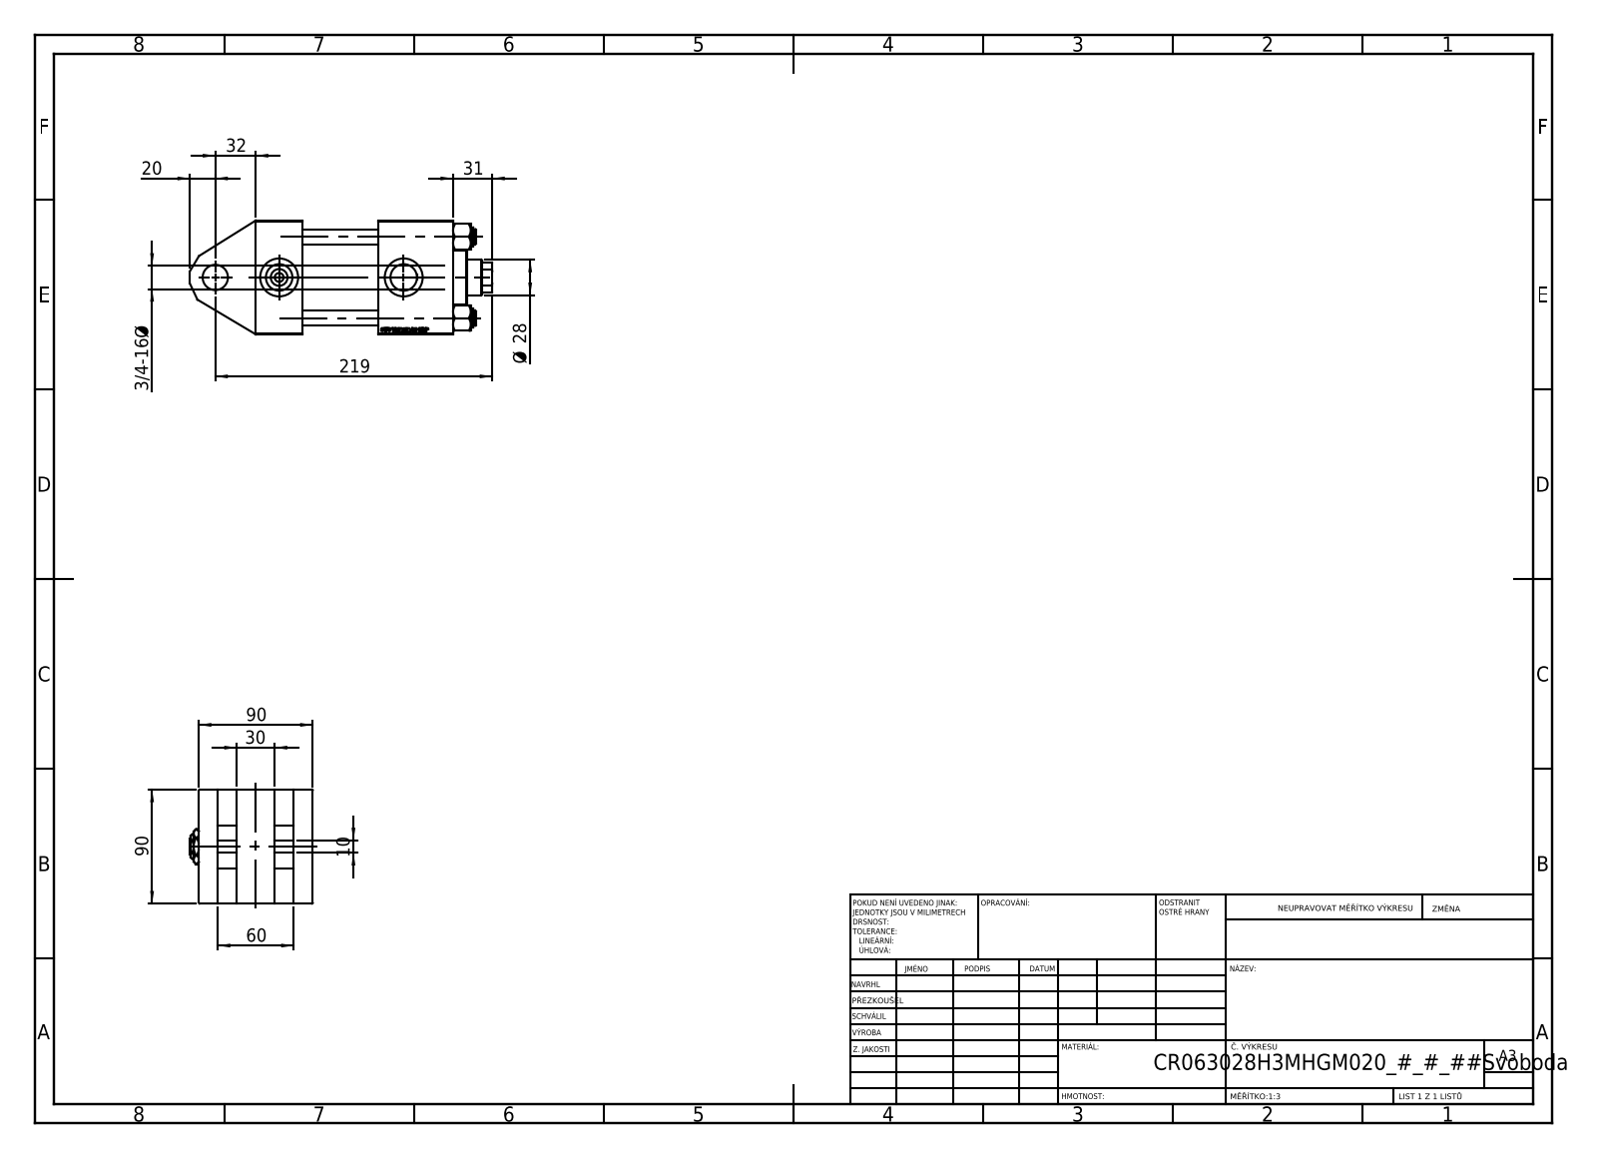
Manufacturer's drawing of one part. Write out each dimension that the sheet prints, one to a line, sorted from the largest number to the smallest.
219
90
90
60
32
31
30
Ø 28
20
10
3/4-16 Ø
